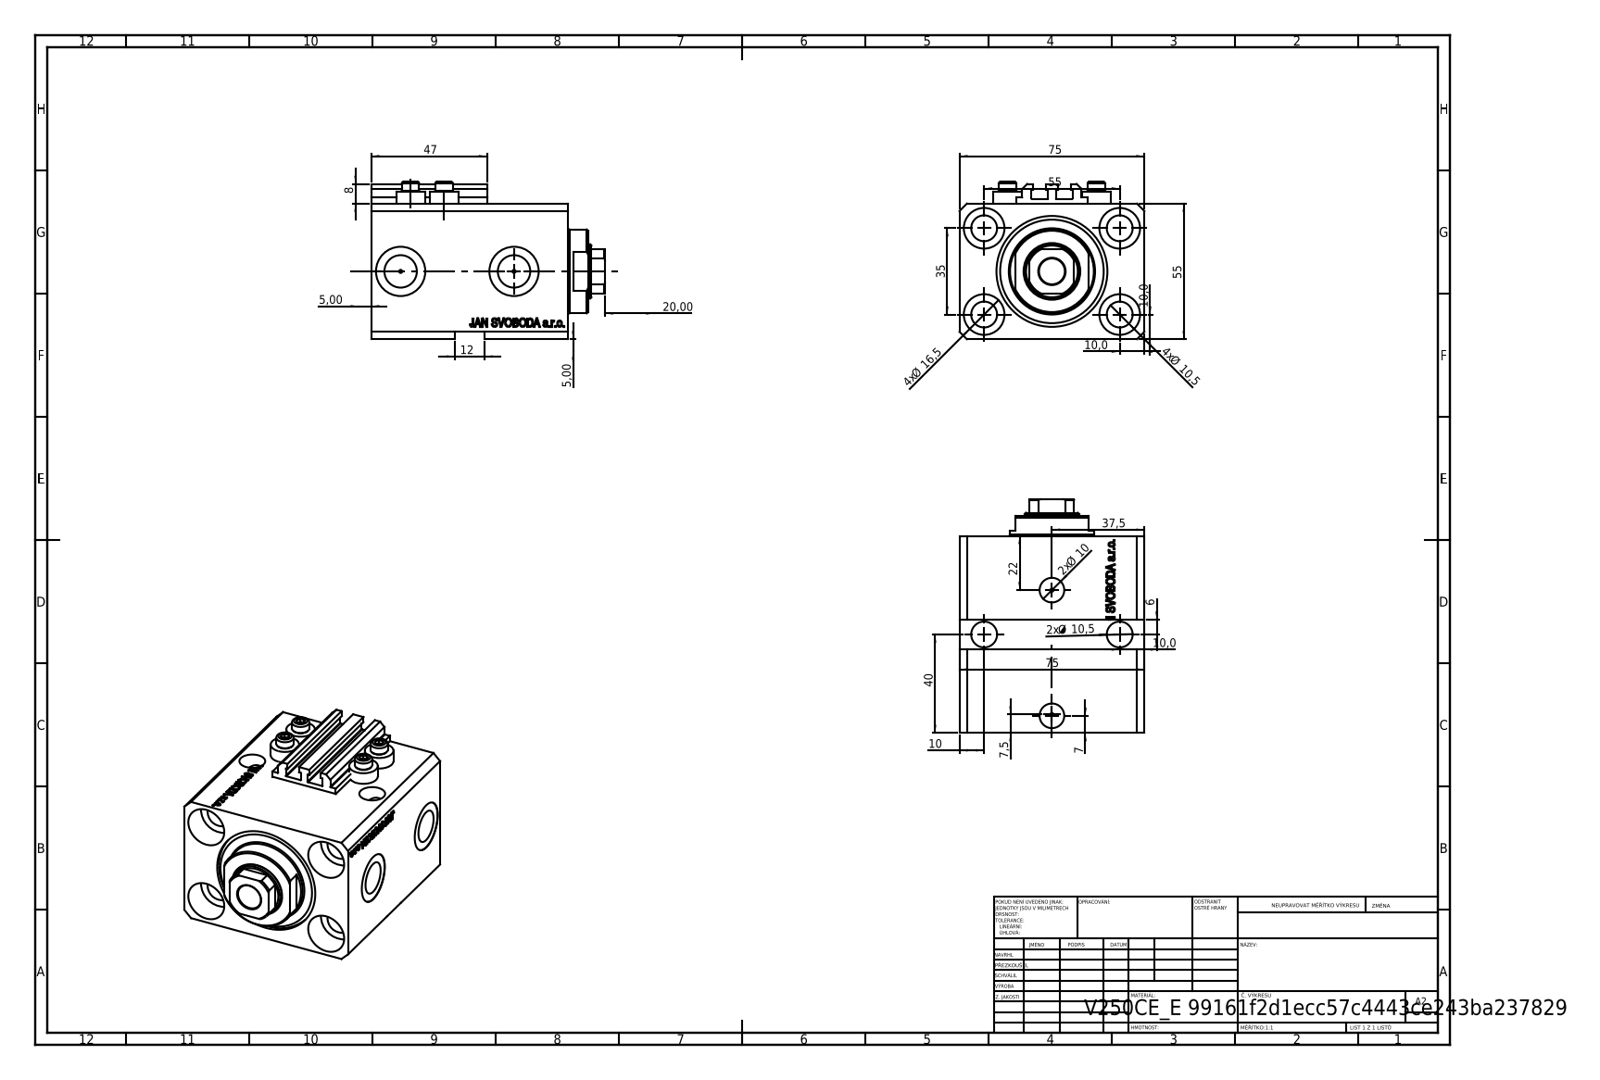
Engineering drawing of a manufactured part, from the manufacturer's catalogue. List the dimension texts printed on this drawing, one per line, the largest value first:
75
75
55
55
47
40
37,5
35
22
20,00
4x Ø 16,5
12
4x Ø 10,5
2x Ø 10,5
10,0
10,0
2x Ø 10
10,0
10
8
7,5
7
6
5,00
5,00
